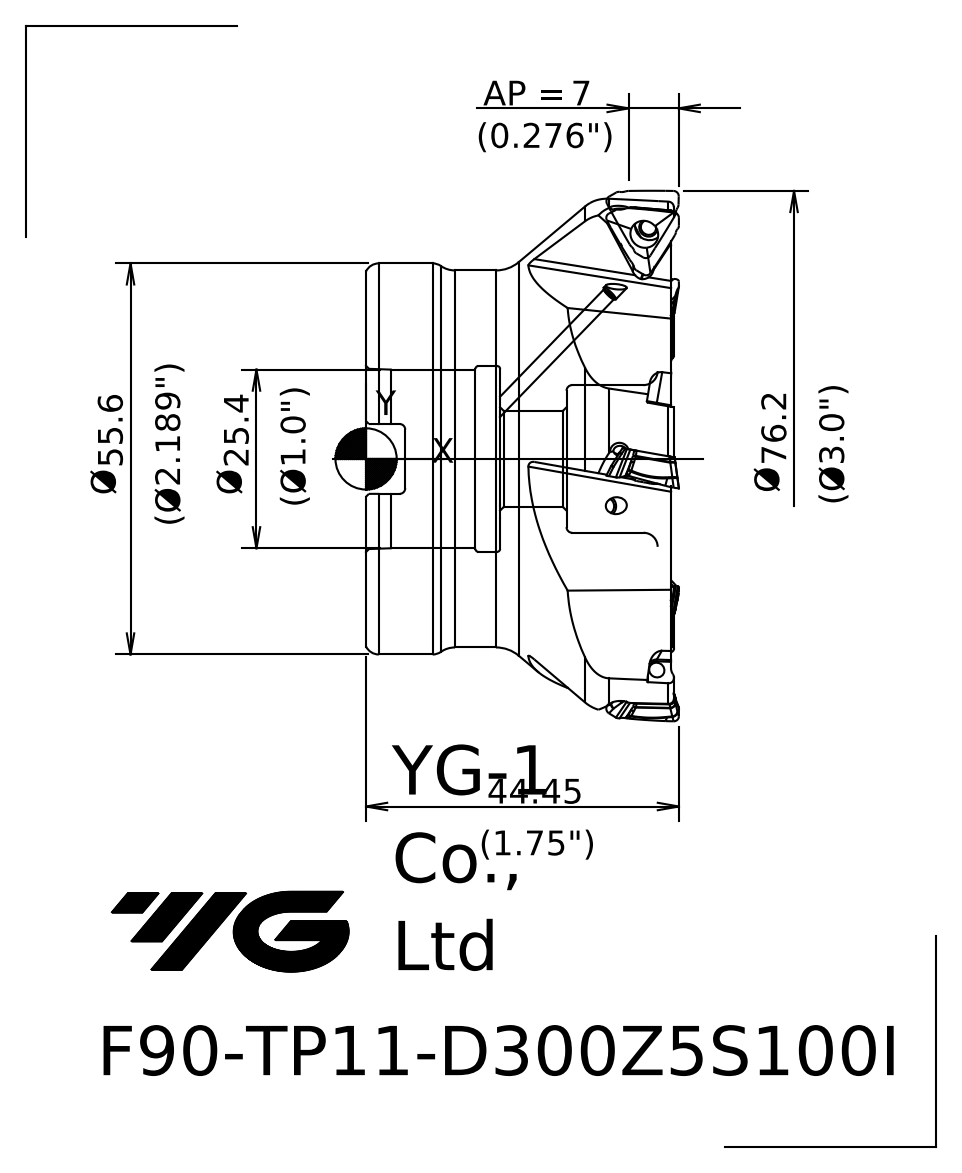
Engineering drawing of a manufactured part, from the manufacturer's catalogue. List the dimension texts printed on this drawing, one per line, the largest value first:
76.2 Ø
55.6 Ø
44.45
25.4 Ø
AP = 7
